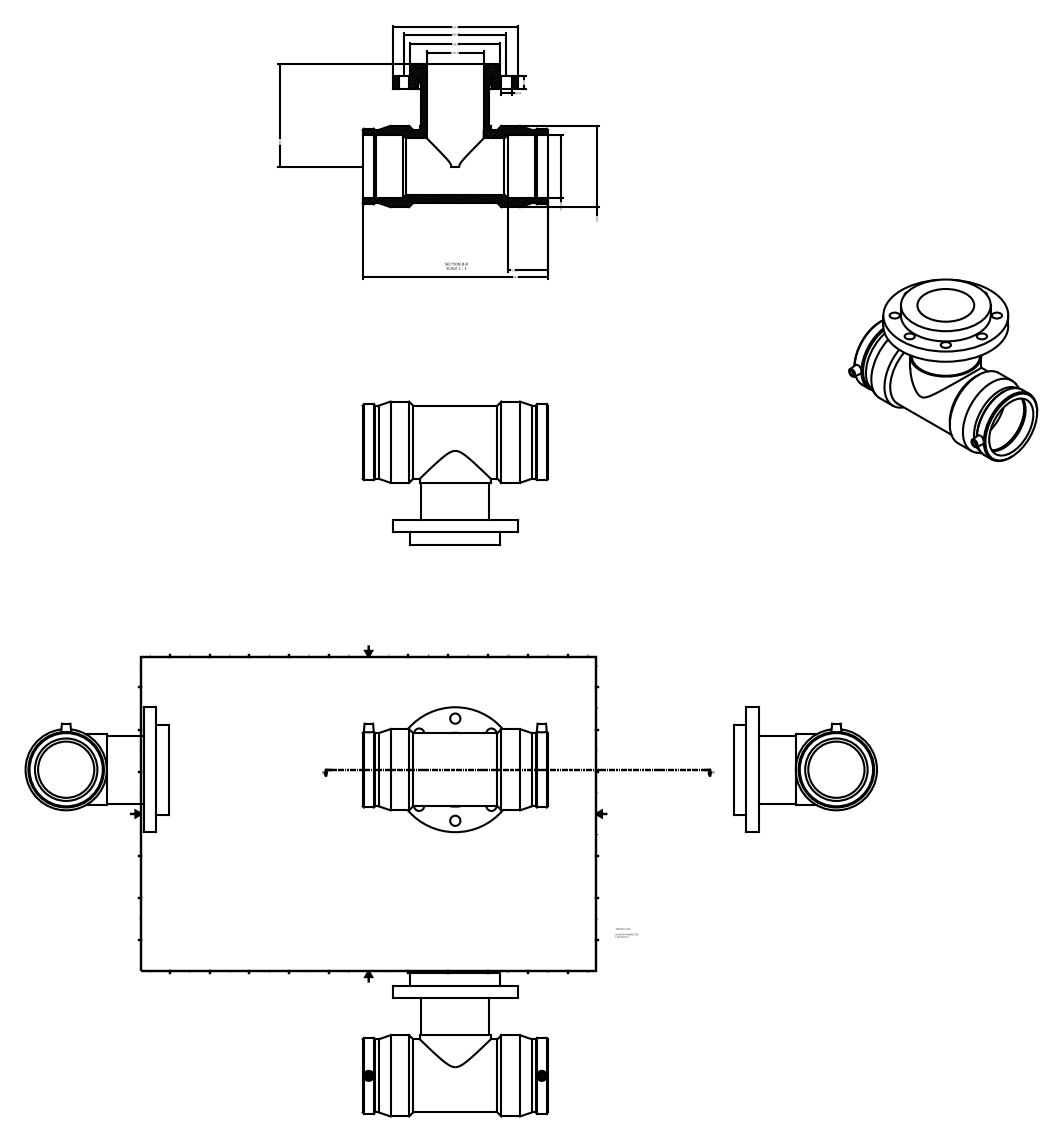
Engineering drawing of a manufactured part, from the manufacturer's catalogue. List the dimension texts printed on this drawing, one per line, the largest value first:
326.00
220.00
181.00
180.00
158.00
143.00
n110.00
n100.00
71.00
22.00
18.00
